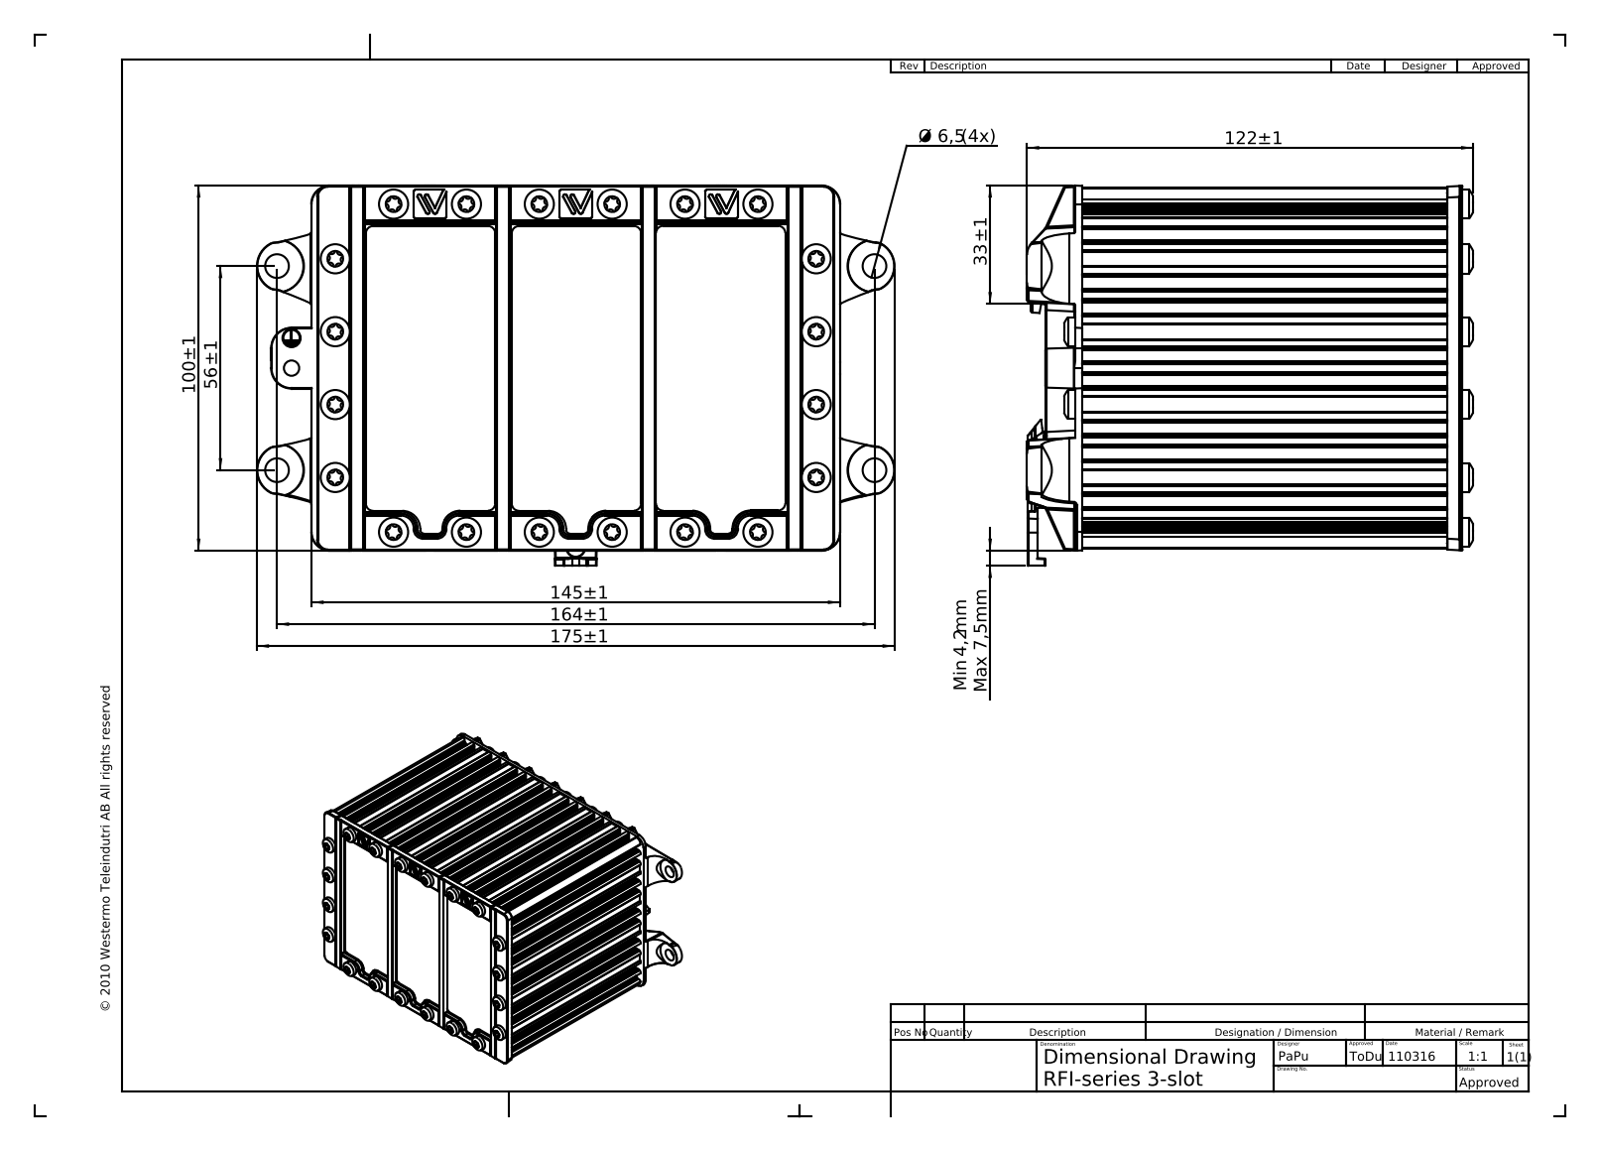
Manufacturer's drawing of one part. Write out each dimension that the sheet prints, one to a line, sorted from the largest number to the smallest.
175 ±1
164 ±1
145 ±1
122 ±1
100 ±1
56 ±1
33 ±1
Ø 6,5 (4x)
Min 4,2 mm Max 7,5mm
